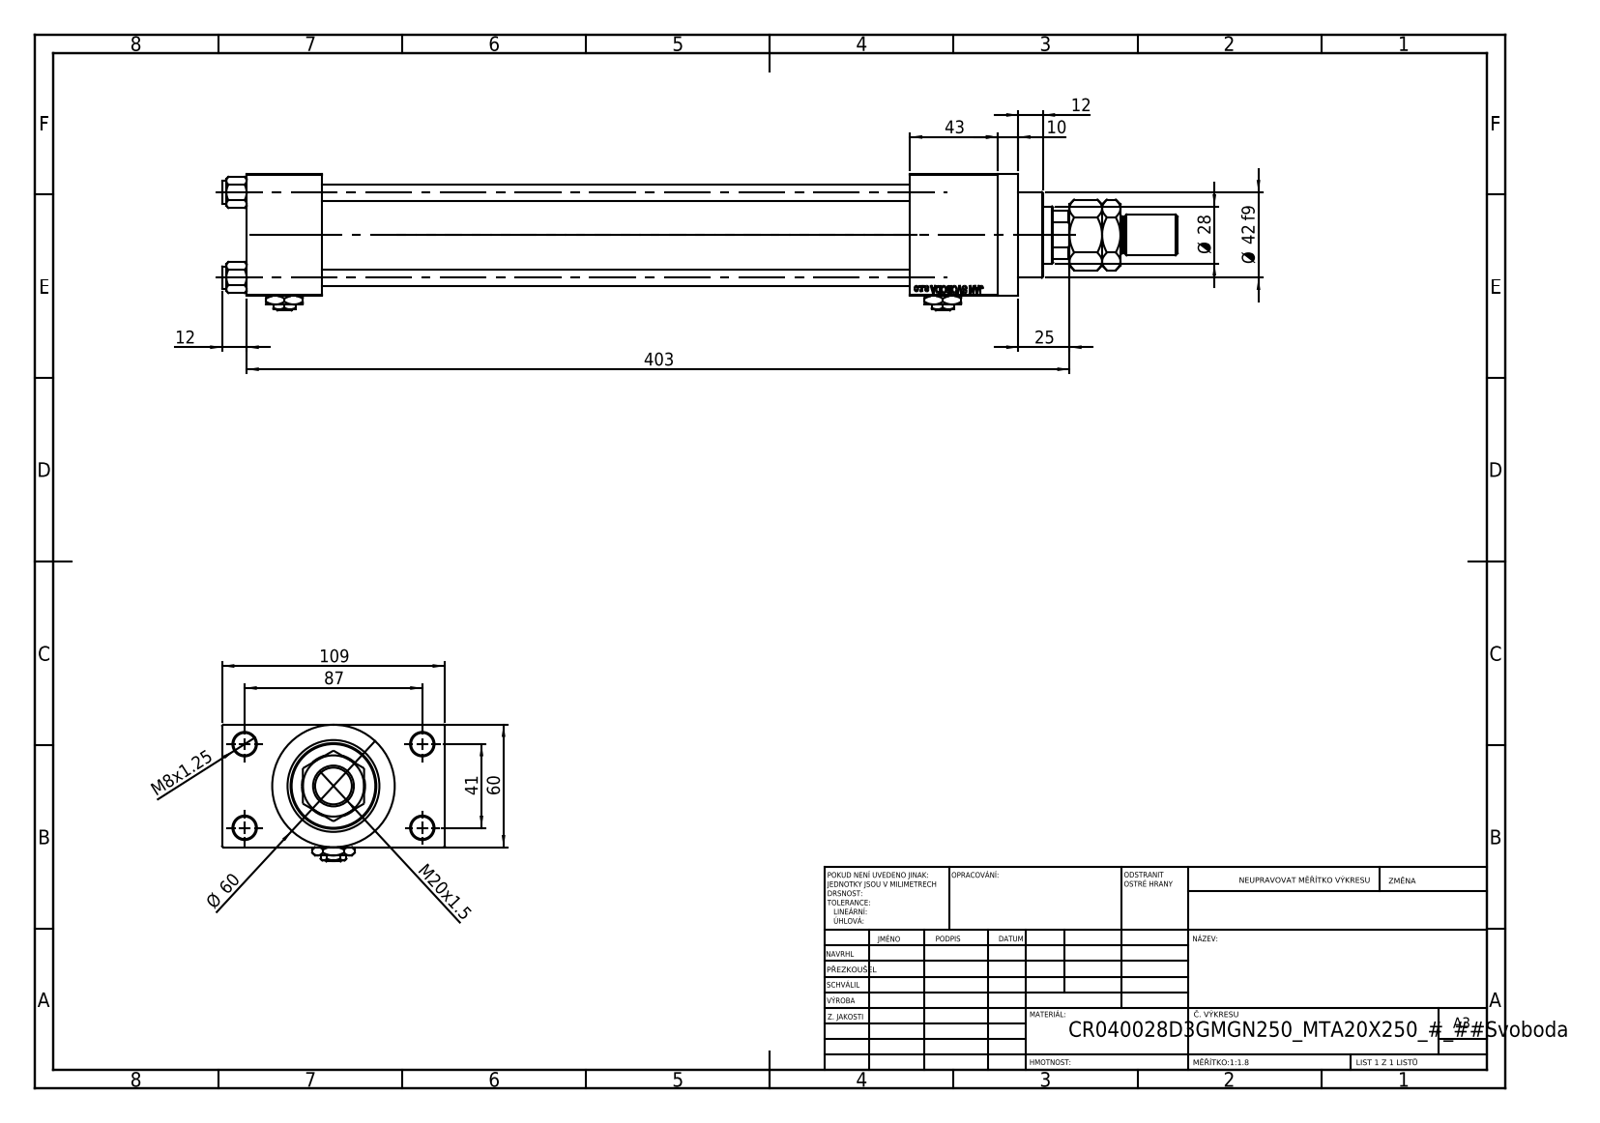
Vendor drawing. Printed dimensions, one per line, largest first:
403
109
87
Ø 60
60
43
Ø 42 f9
41
Ø 28
25
M20x1.5
12
12
10
M8x1.25
